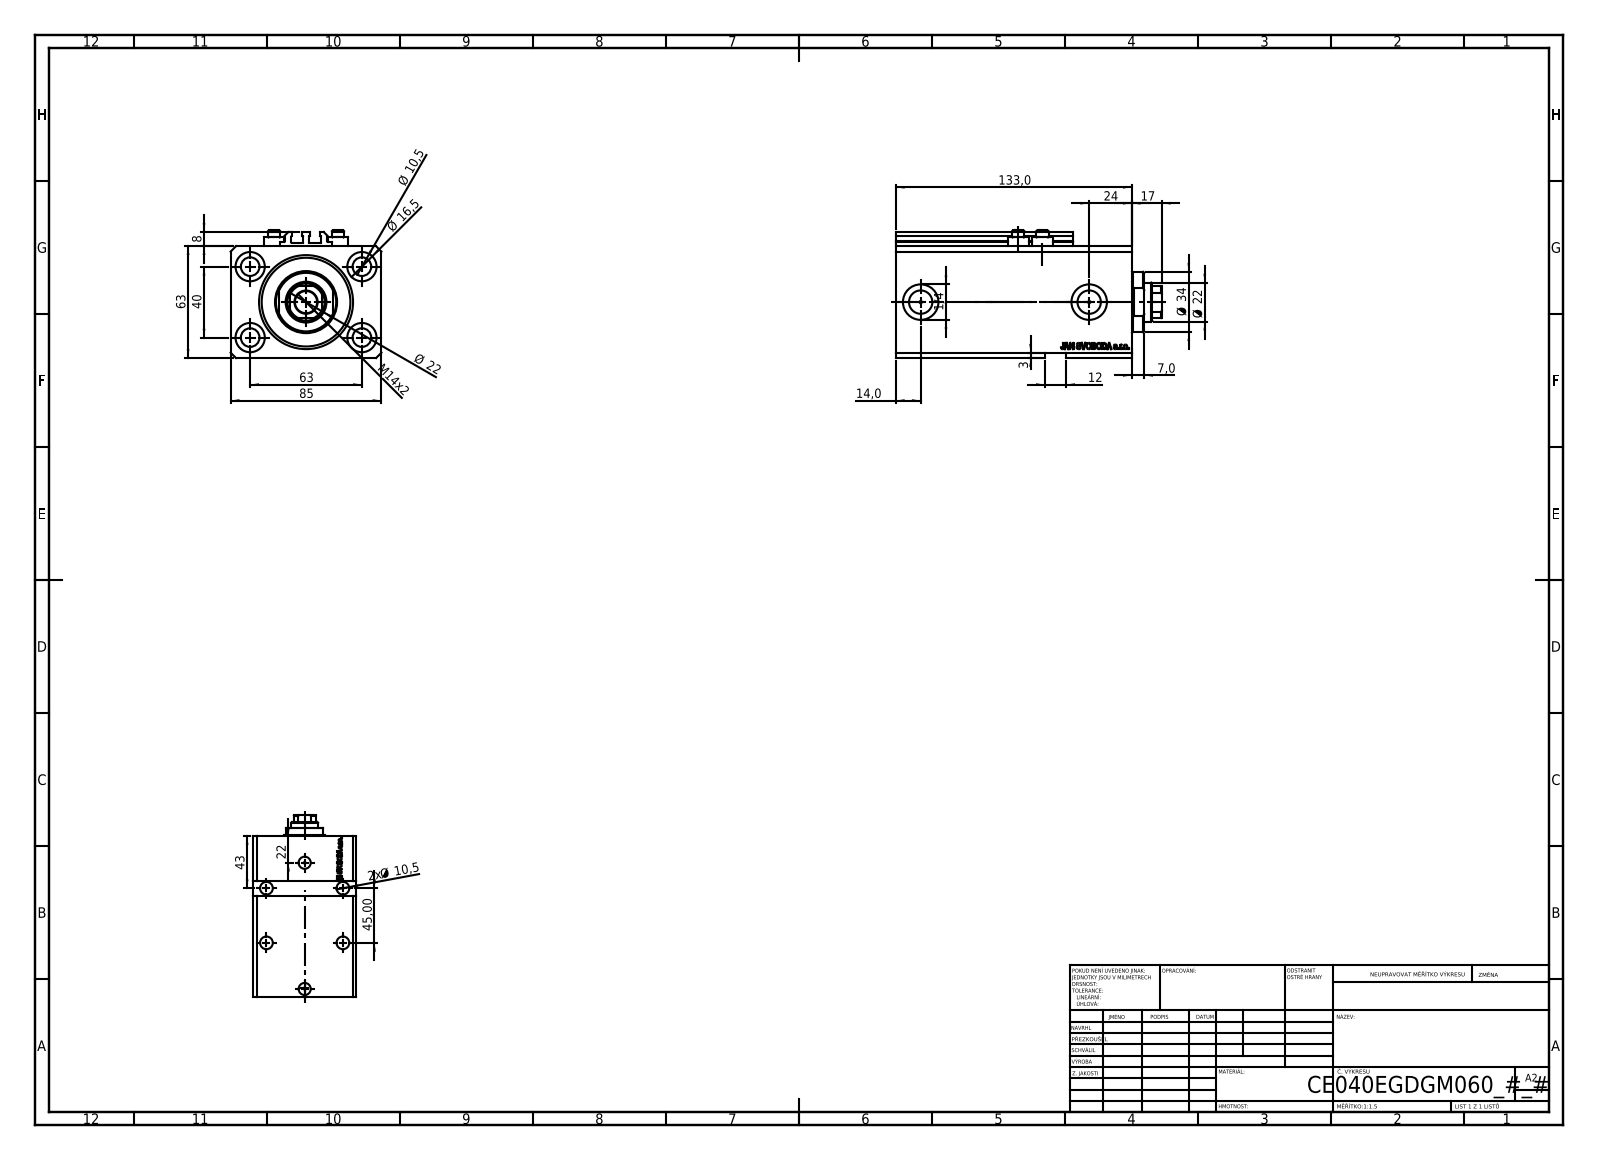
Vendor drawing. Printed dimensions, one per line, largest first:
133,0
85
63
63
45,00
43
40
Ø 34
24
Ø 22
Ø 22
22
17
Ø 16,5
M14x2
14,0
12
Ø 10,5
2x Ø 10,5
8
7,0
3
1/4
